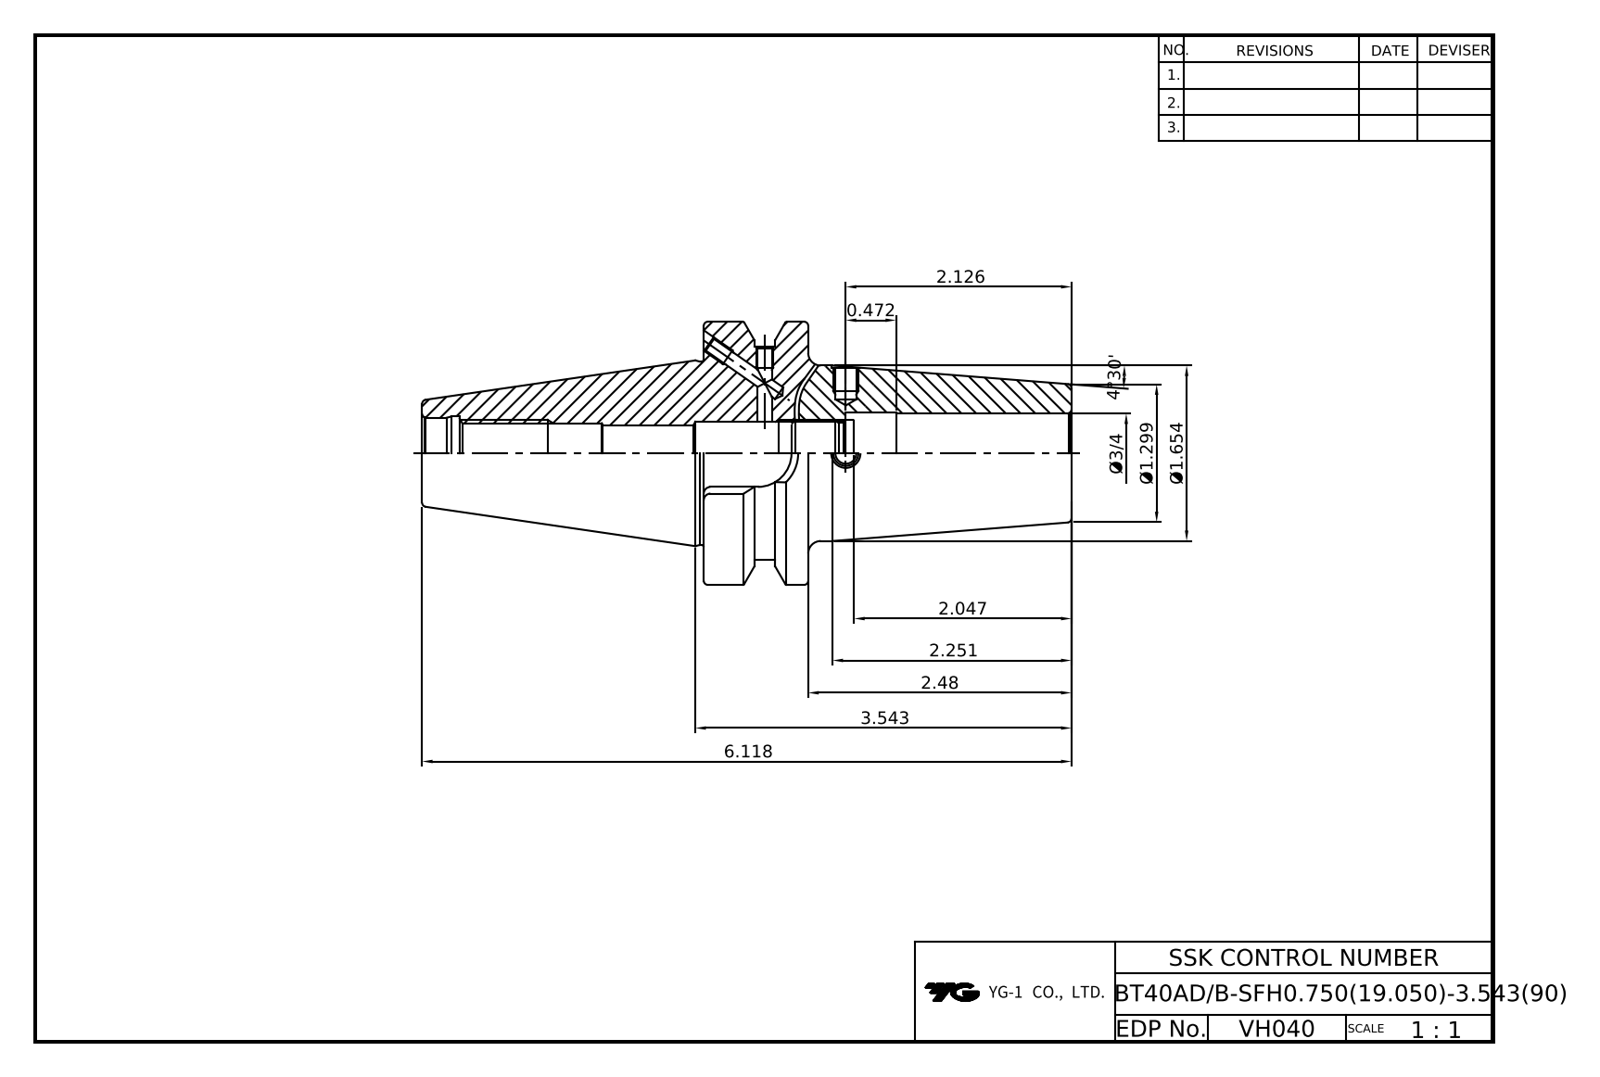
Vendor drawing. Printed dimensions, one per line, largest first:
6.118
4°30'
3.543
2.48
2.251
2.126
2.047
Ø1.654
Ø1.299
0.472
